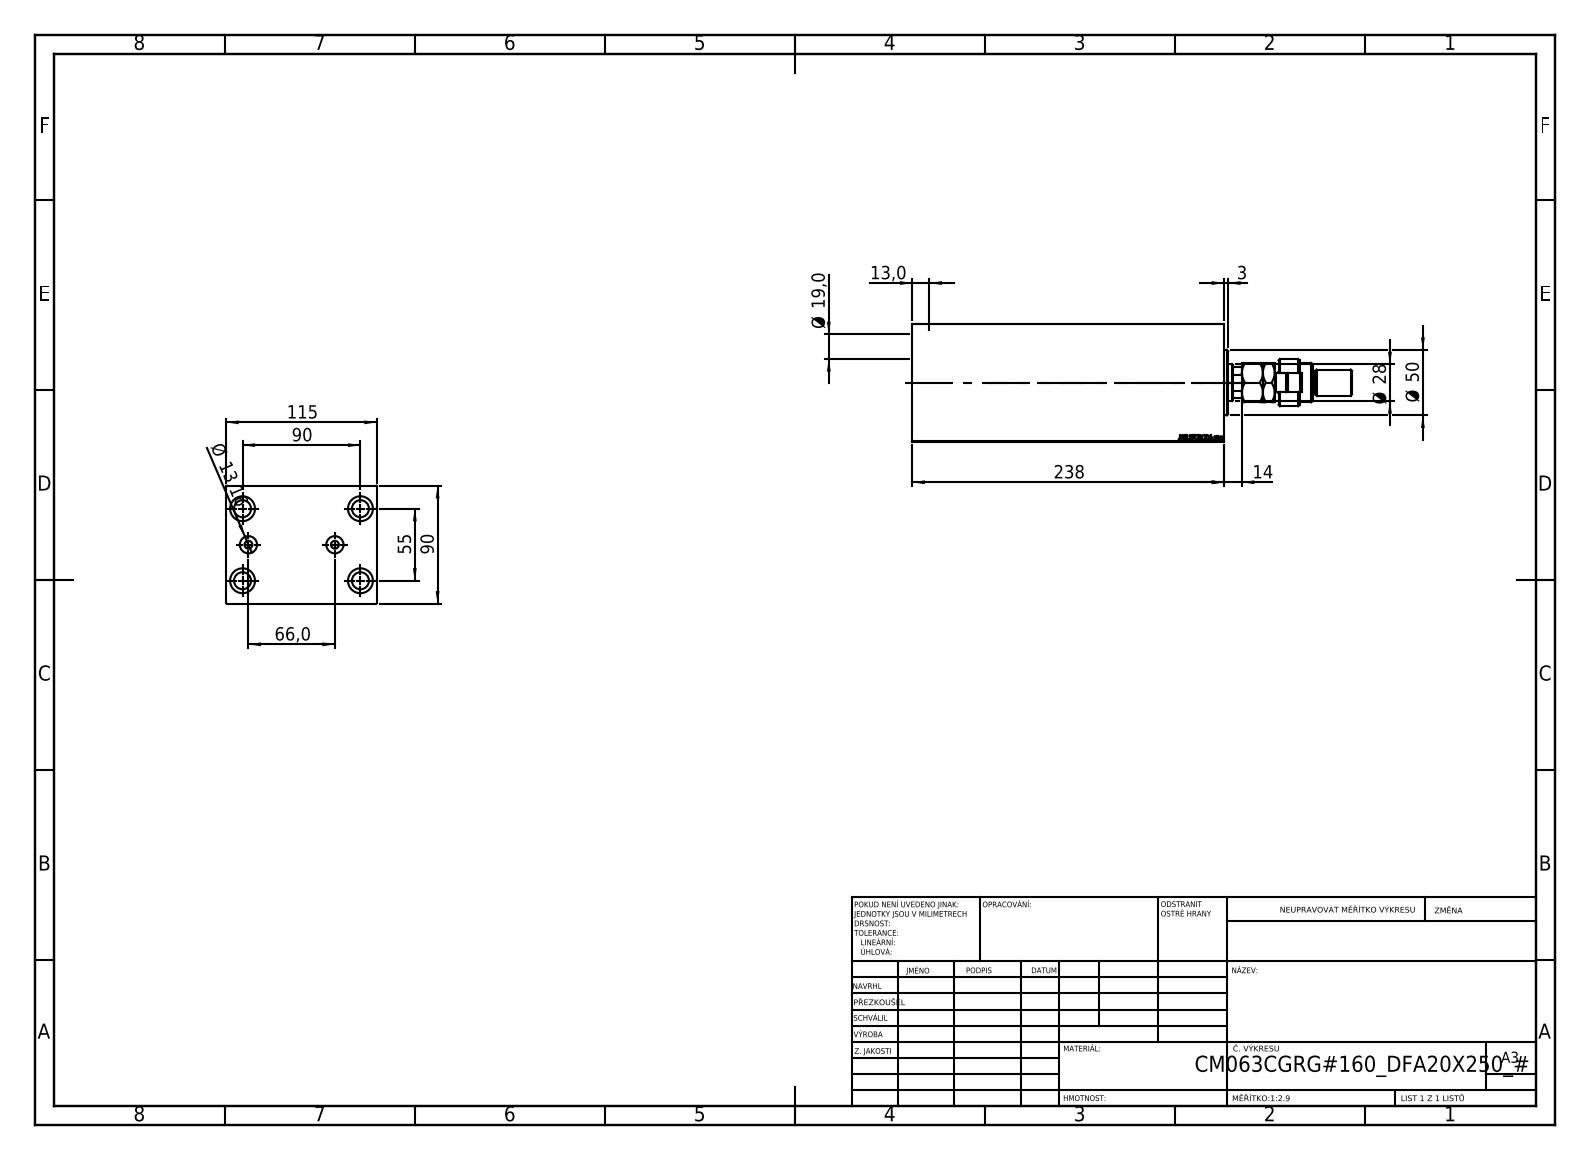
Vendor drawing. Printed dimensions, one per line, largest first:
238
115
90
90
66,0
55
Ø 50
Ø 28
Ø 19,0
14
Ø 13,16
13,0
3
